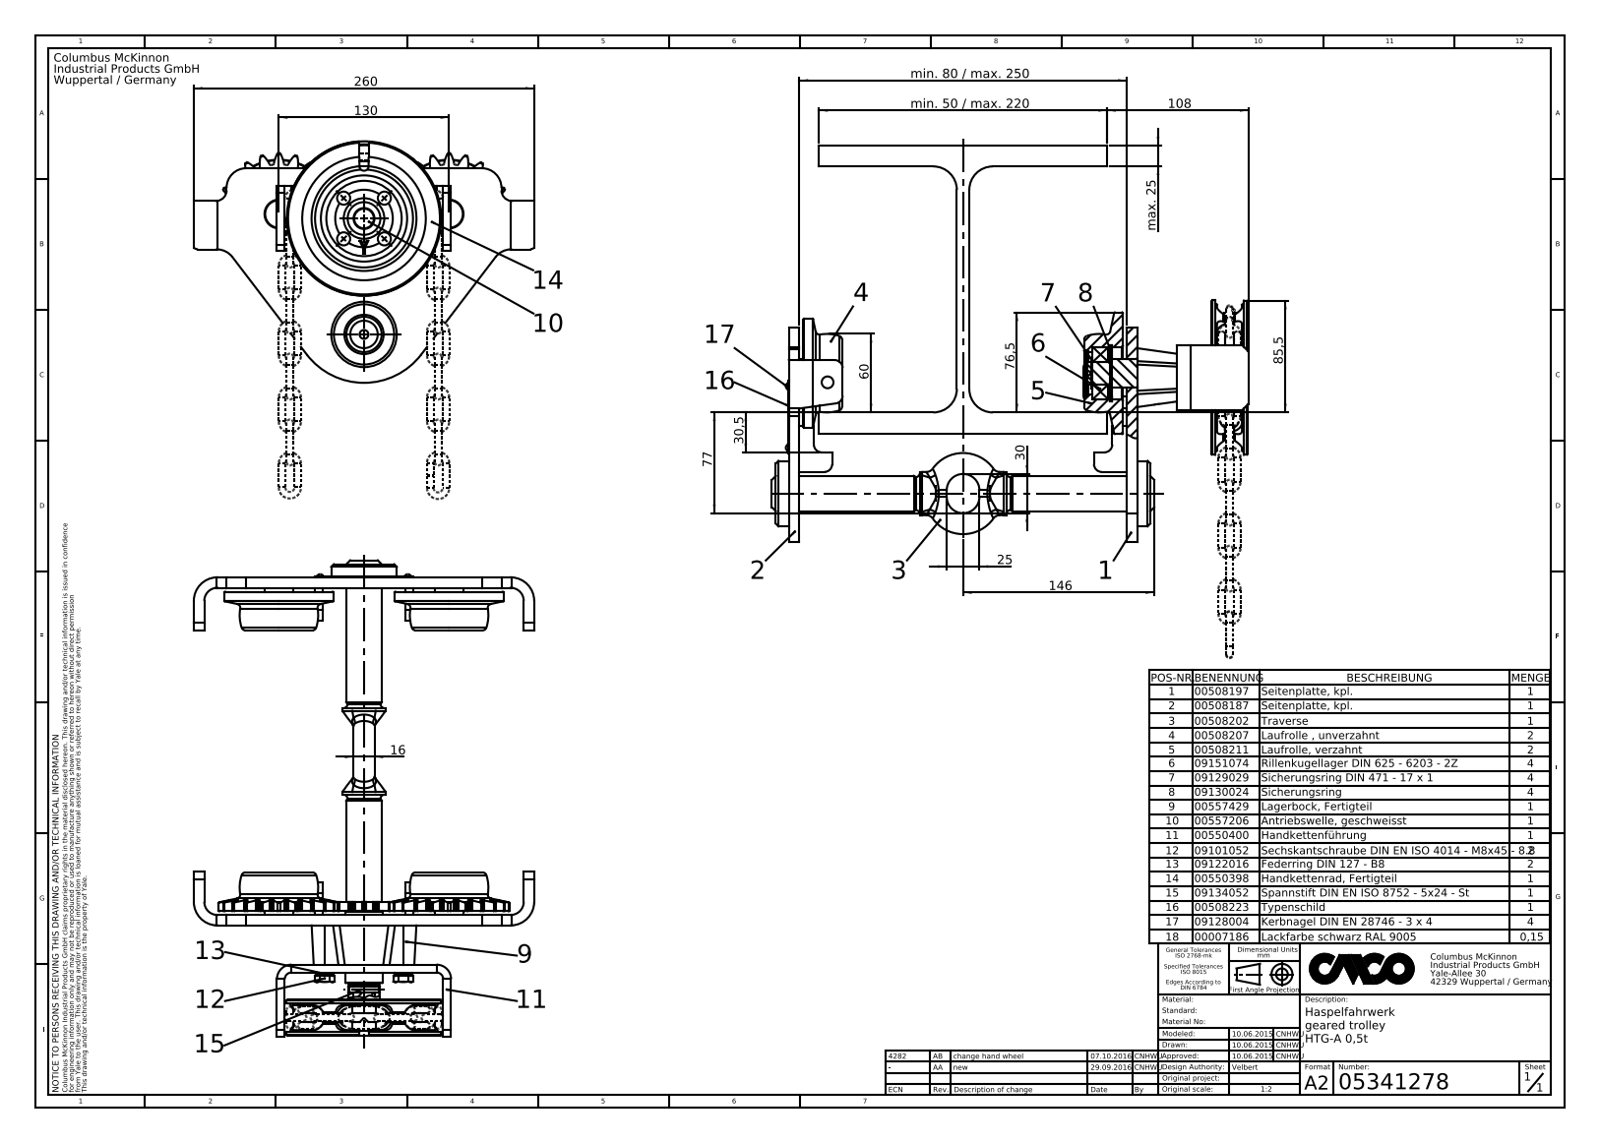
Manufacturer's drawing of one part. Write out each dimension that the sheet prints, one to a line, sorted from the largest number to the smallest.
260
146
130
108
85,5
min. 80 / max. 250
77
76,5
60
min. 50 / max. 220
30,5
30
max. 25
25
16
